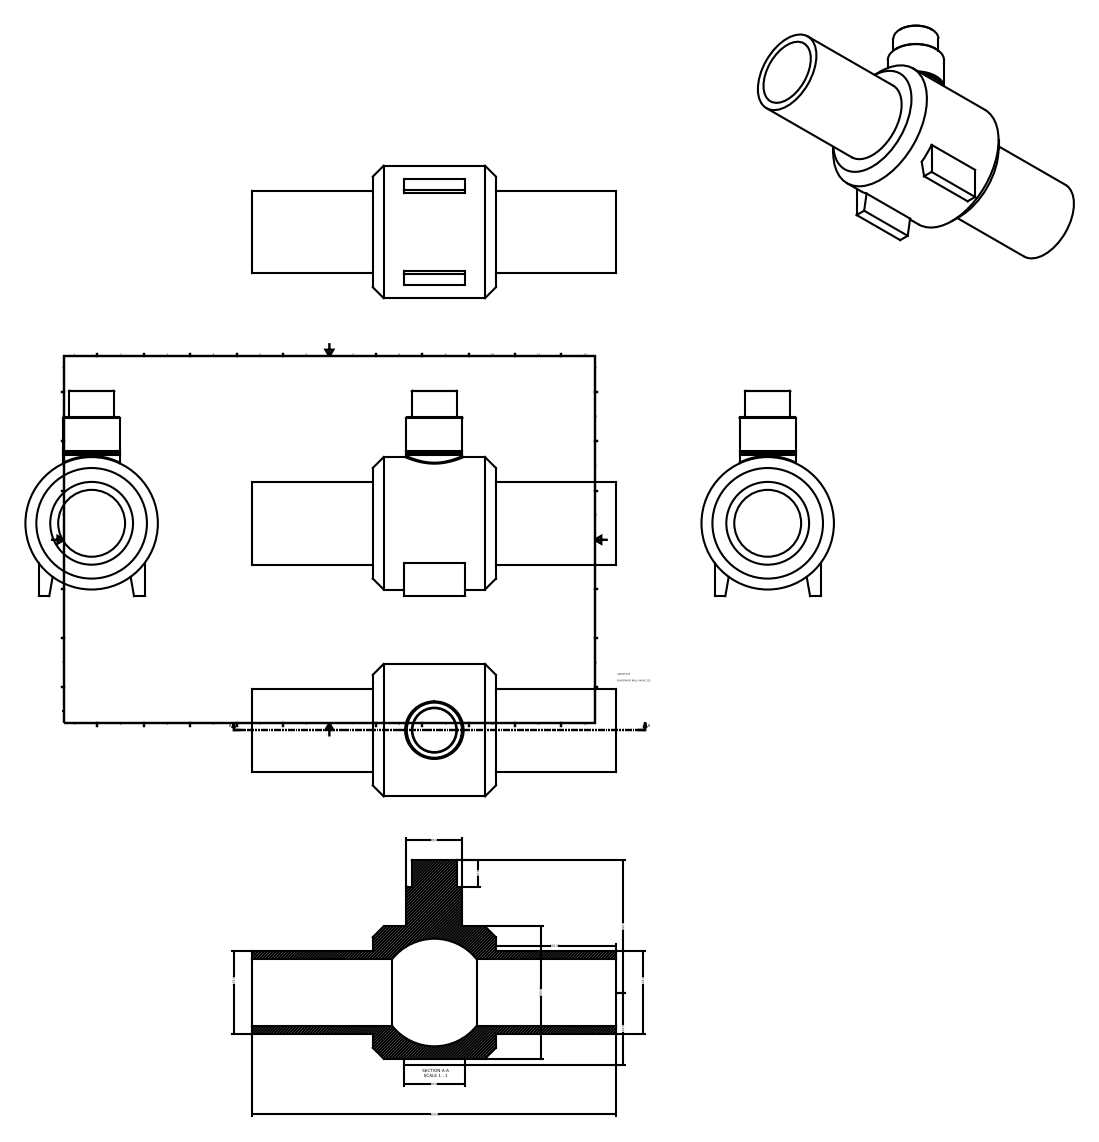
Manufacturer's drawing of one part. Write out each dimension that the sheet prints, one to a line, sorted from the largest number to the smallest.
550.00
200.00
200.00
182.00
125.00
125.00
110.00
93.00
85.00
40.00
